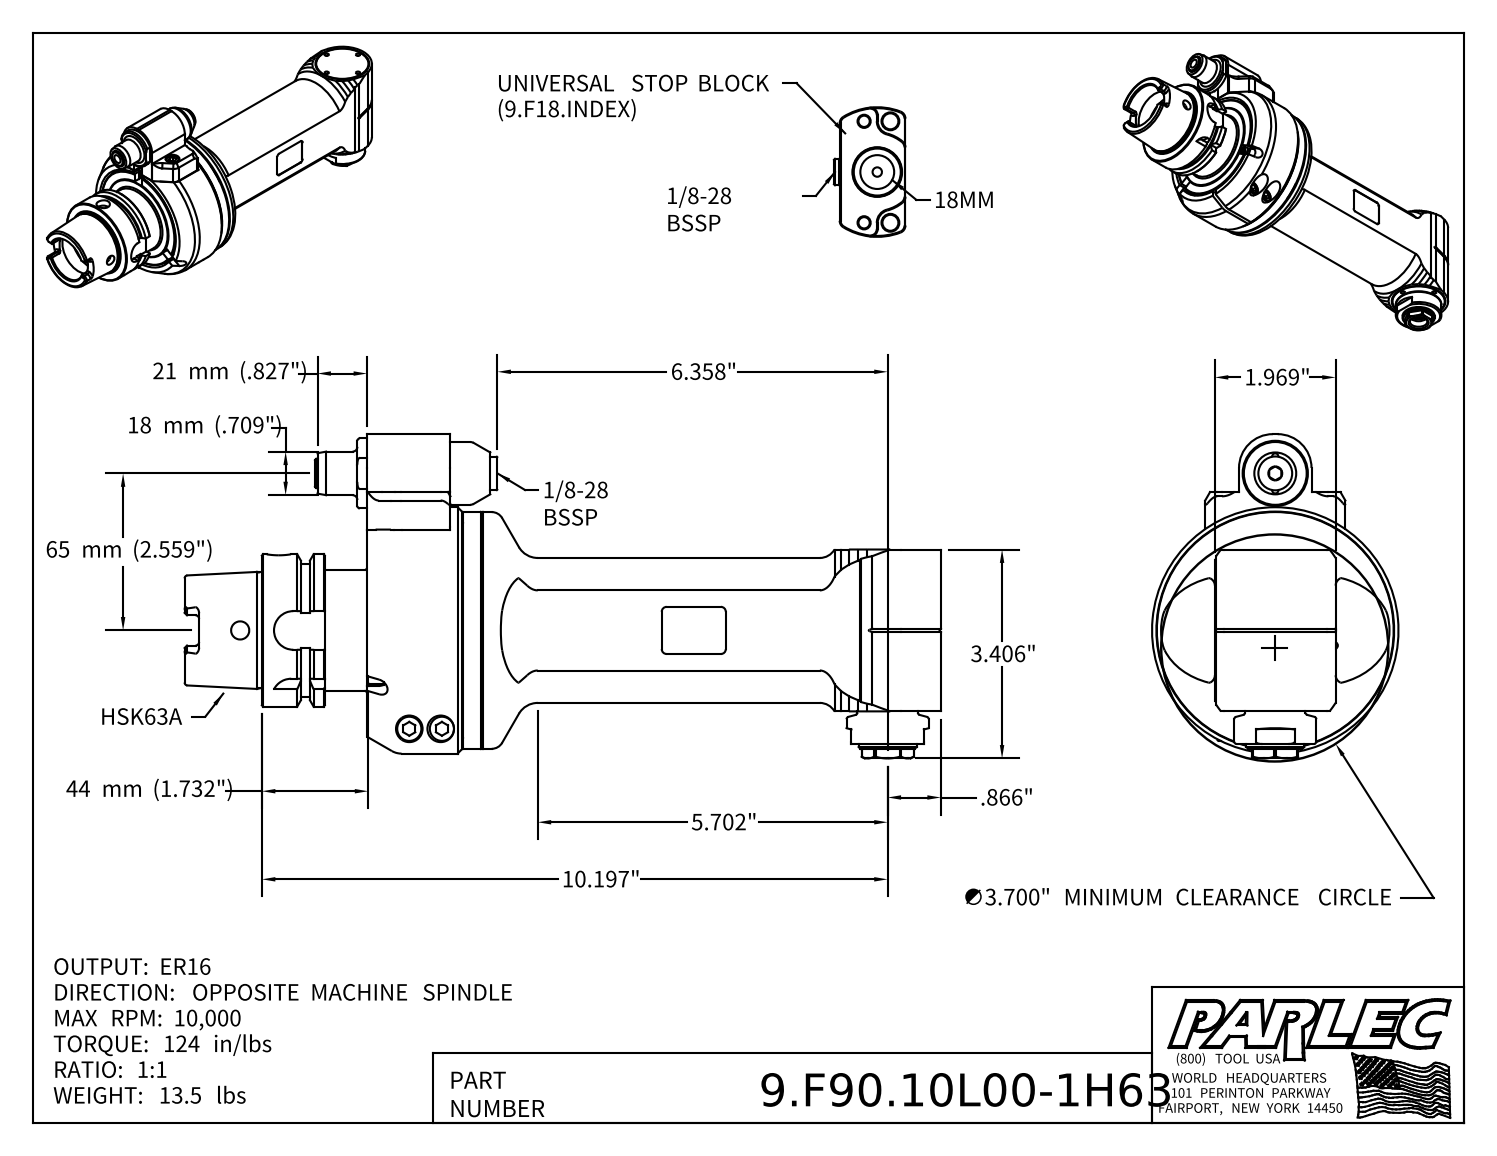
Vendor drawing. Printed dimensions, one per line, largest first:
65 mm (2.559")
44 mm (1.732")
21 mm (.827")
18 mm (.709")
10.197"
6.358"
5.702"
∅3.700" MINIMUM CLEARANCE CIRCLE
3.406"
1.969"
.866"
